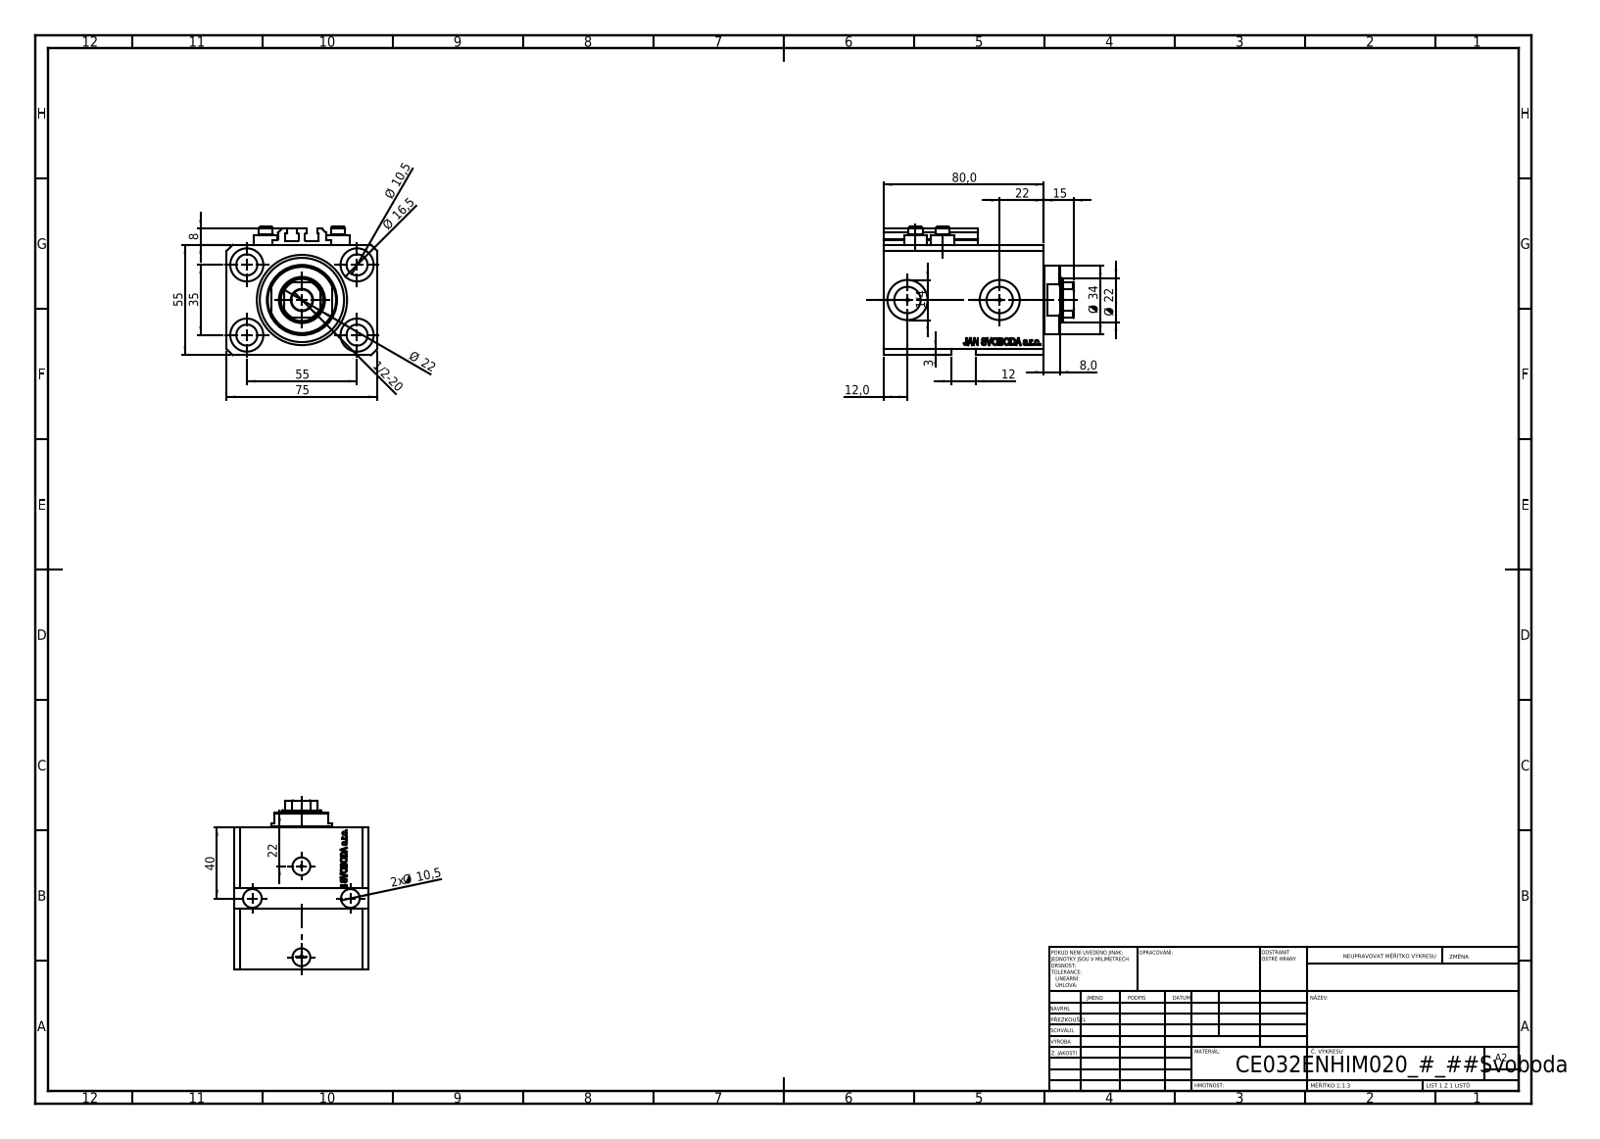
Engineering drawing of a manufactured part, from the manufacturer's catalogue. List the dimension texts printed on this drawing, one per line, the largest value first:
80,0
75
55
55
40
35
Ø 34
Ø 22
22
Ø 22
22
Ø 16,5
15
12,0
12
Ø 10,5
2x Ø 10,5
8
8,0
3
1/2-20
1/4
